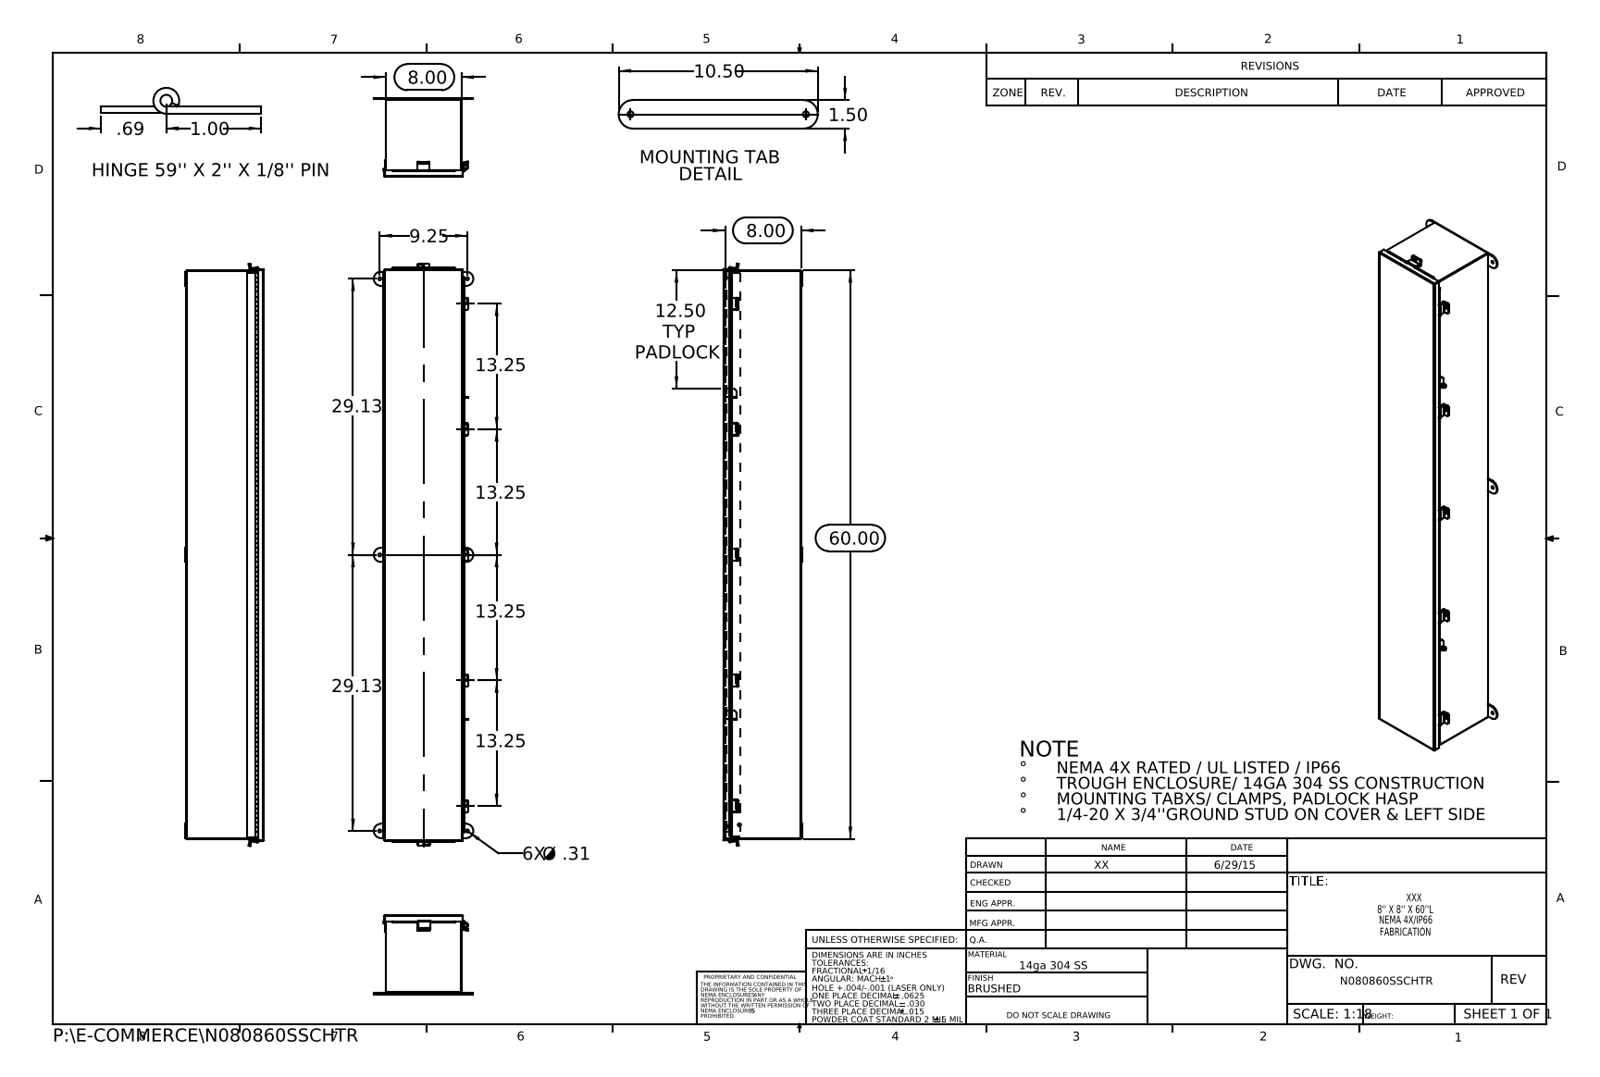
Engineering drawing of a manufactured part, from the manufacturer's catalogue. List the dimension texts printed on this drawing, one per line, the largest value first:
60.00
29.13
29.13
13.25
13.25
13.25
13.25
12.50 TYP PADLOCK
10.50
9.25
8.00
8.00
1.50
1.00
.69
6X Ø .31
